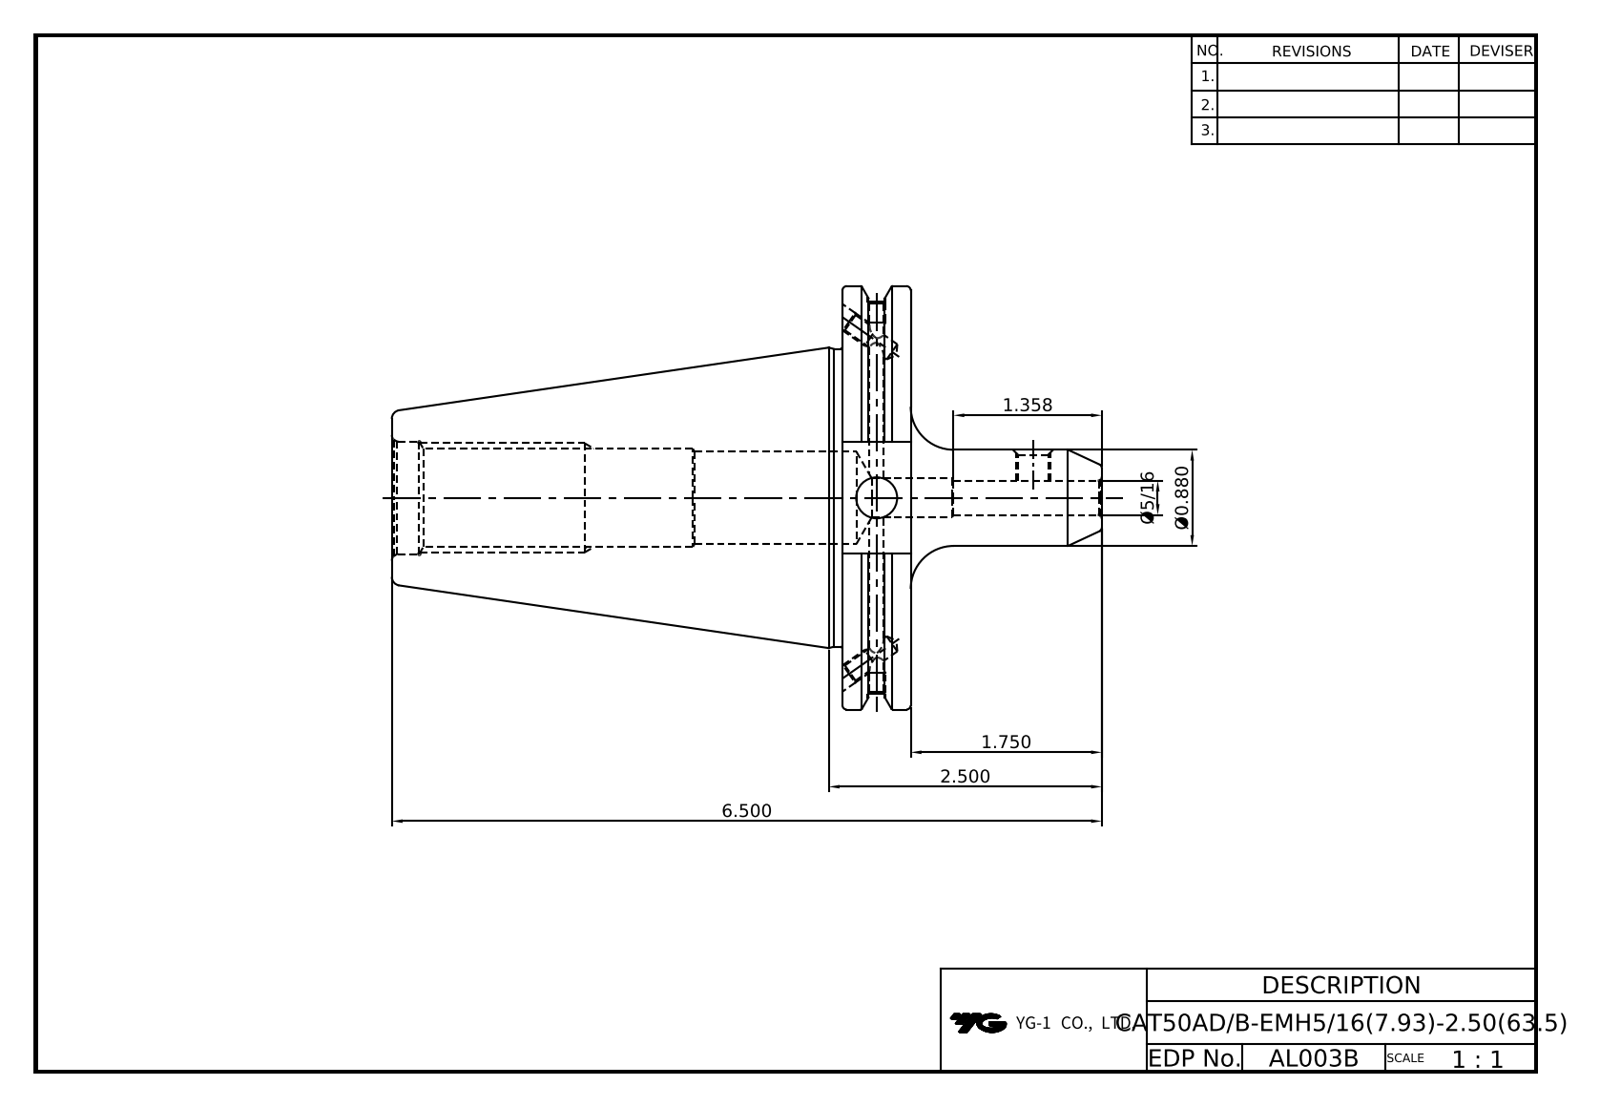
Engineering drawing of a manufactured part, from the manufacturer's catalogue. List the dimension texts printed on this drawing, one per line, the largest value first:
6.500
2.500
1.750
1.358
Ø0.880
Ø5/16
